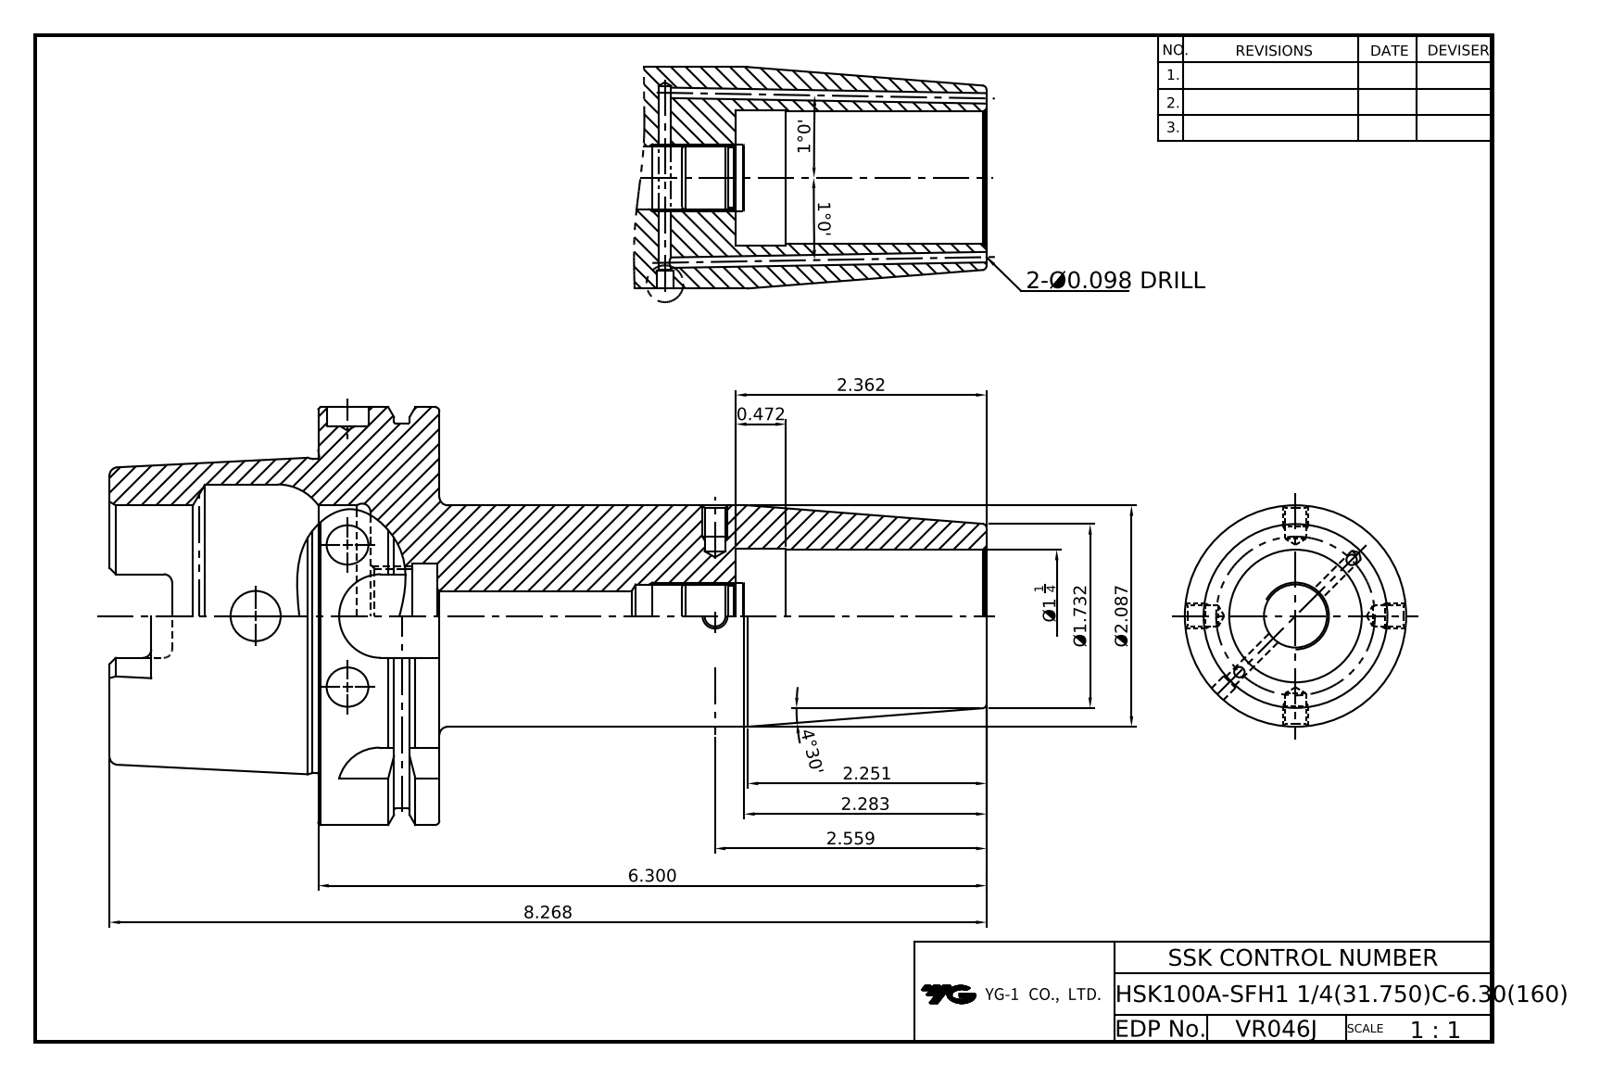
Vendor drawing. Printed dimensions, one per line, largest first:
8.268
6.300
4°30'
2.559
2.362
2.283
2.251
Ø2.087
Ø1.732
1°0'
1°0'
0.472
